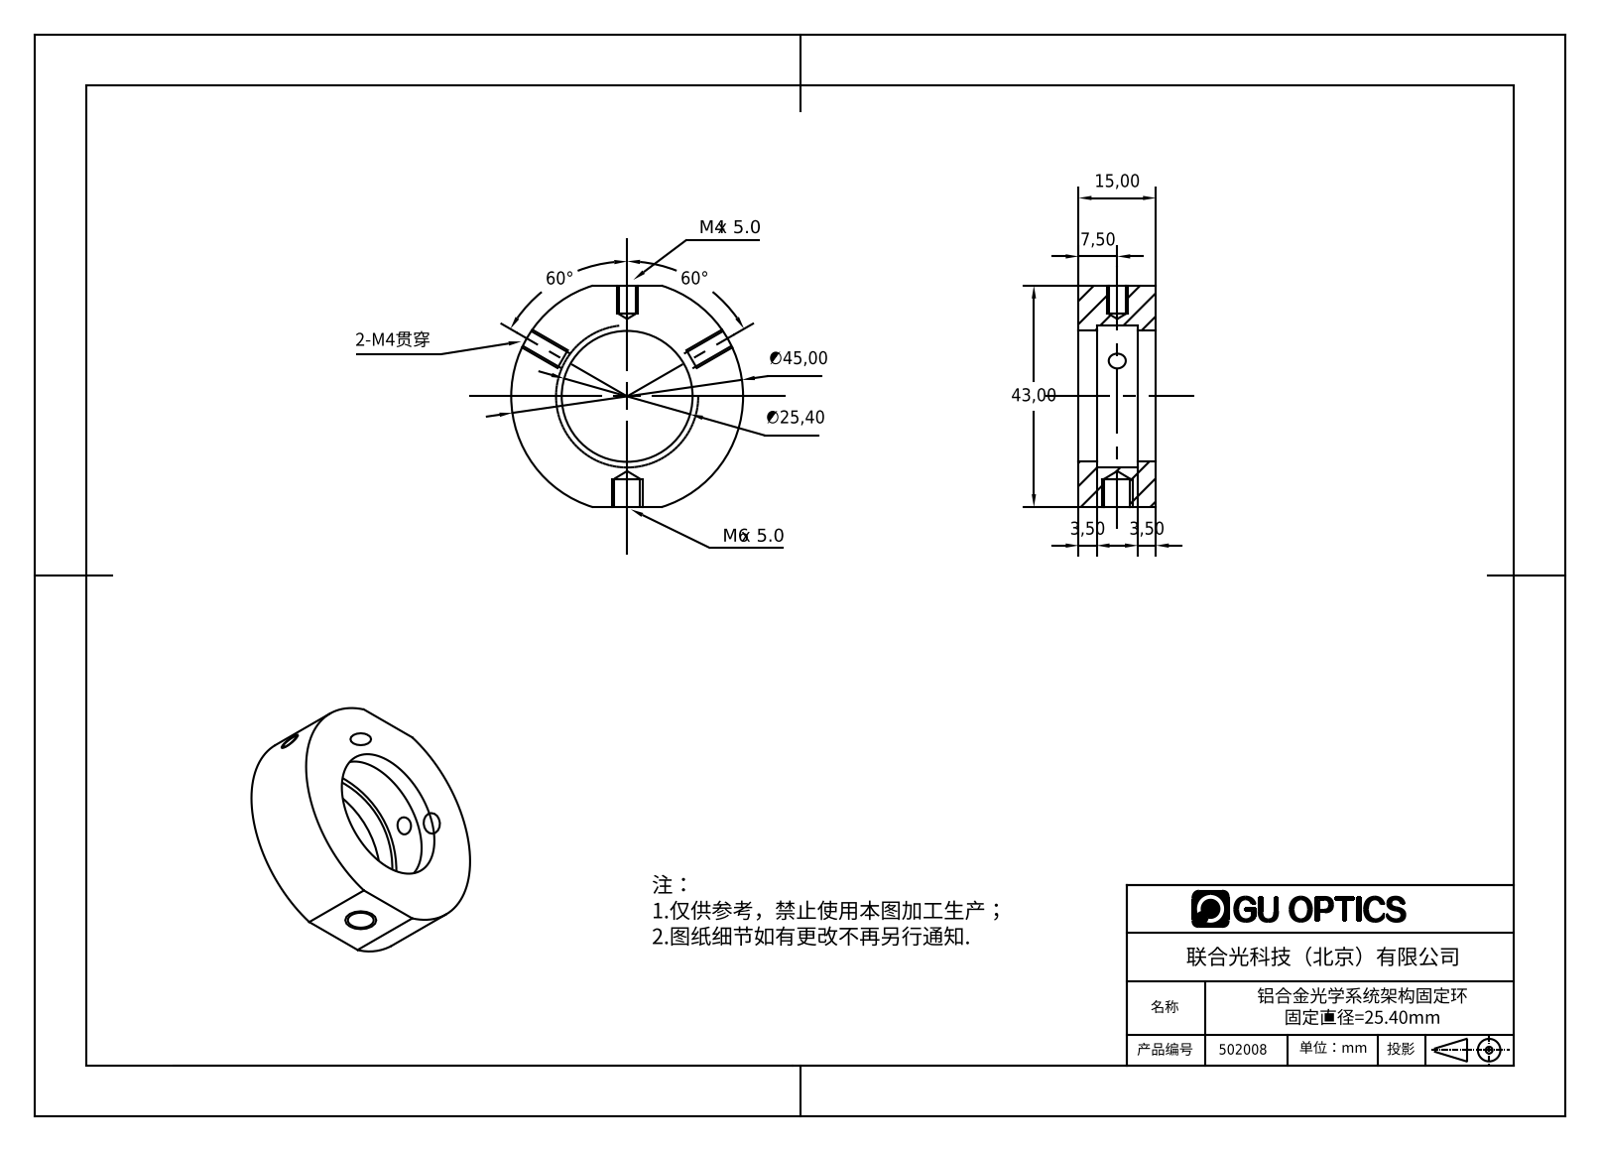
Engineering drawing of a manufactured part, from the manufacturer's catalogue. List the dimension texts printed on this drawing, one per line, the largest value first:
60°
60°
∅45,00
43,00
∅25,40
15,00
7,50
3,50
3,50
